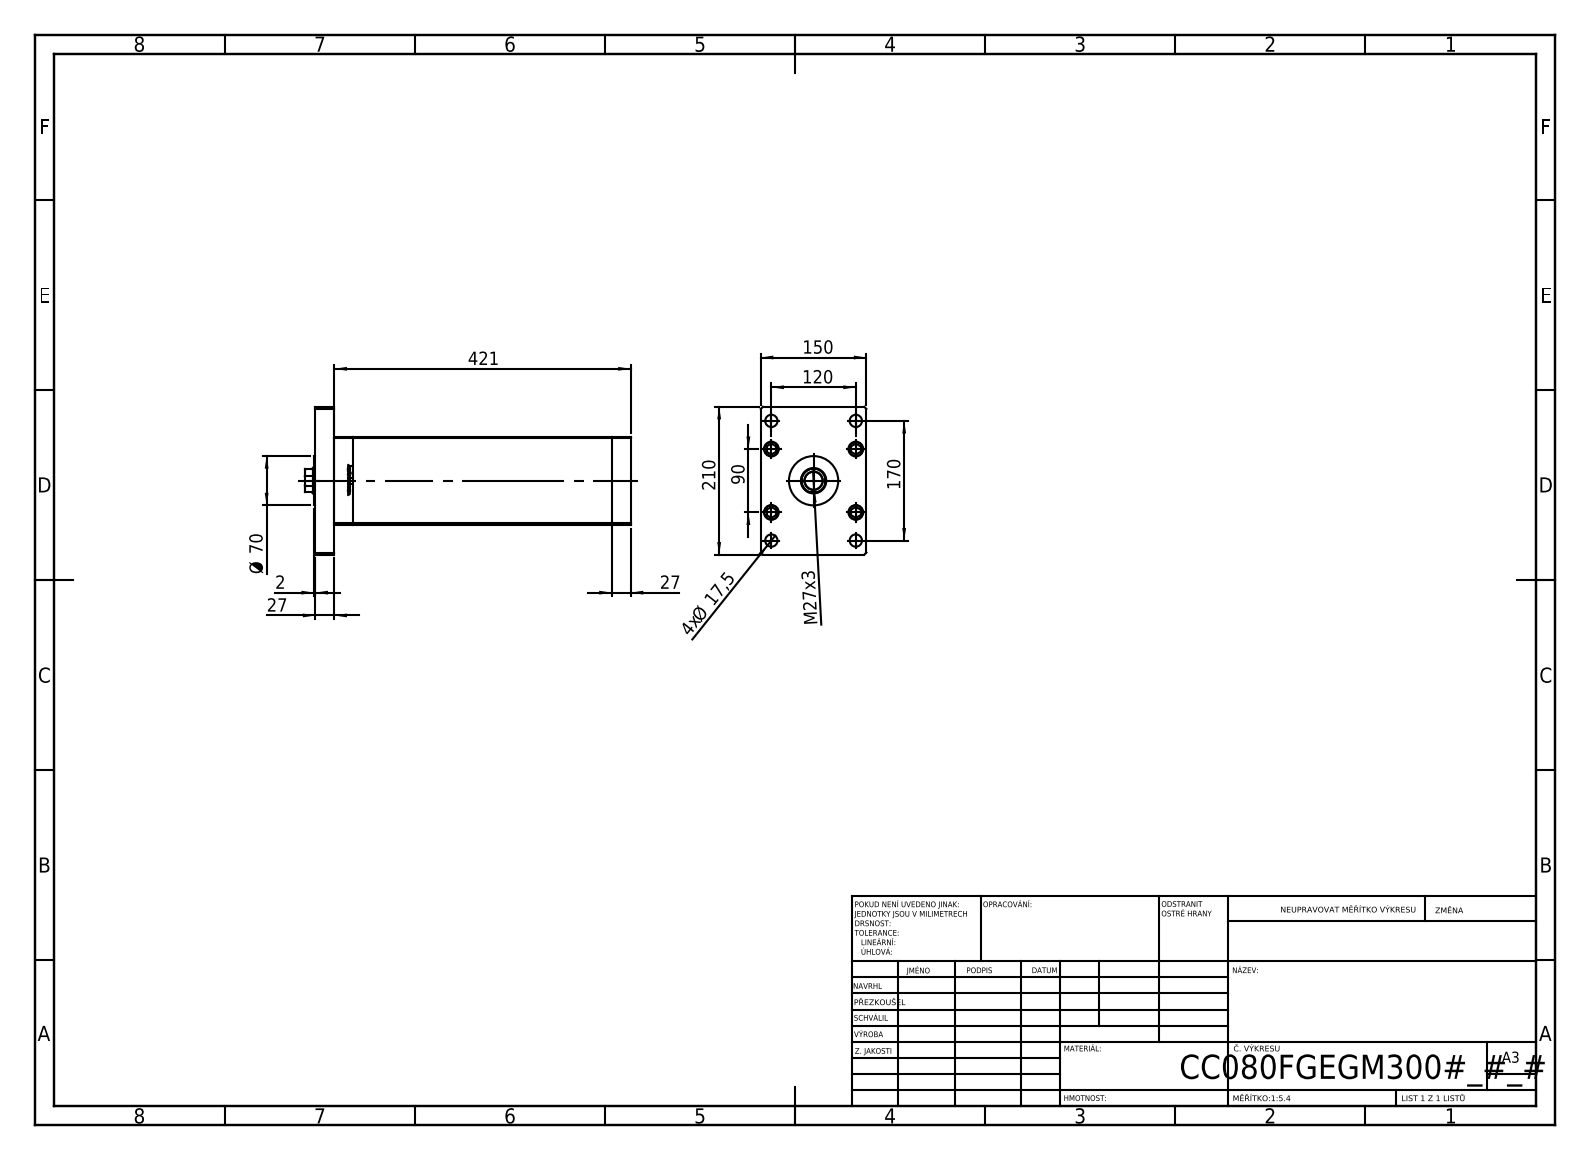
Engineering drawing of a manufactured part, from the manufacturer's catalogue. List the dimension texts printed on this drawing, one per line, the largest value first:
421
210
170
150
120
90
Ø 70
27
27
M27x3
4x Ø 17,5
2
